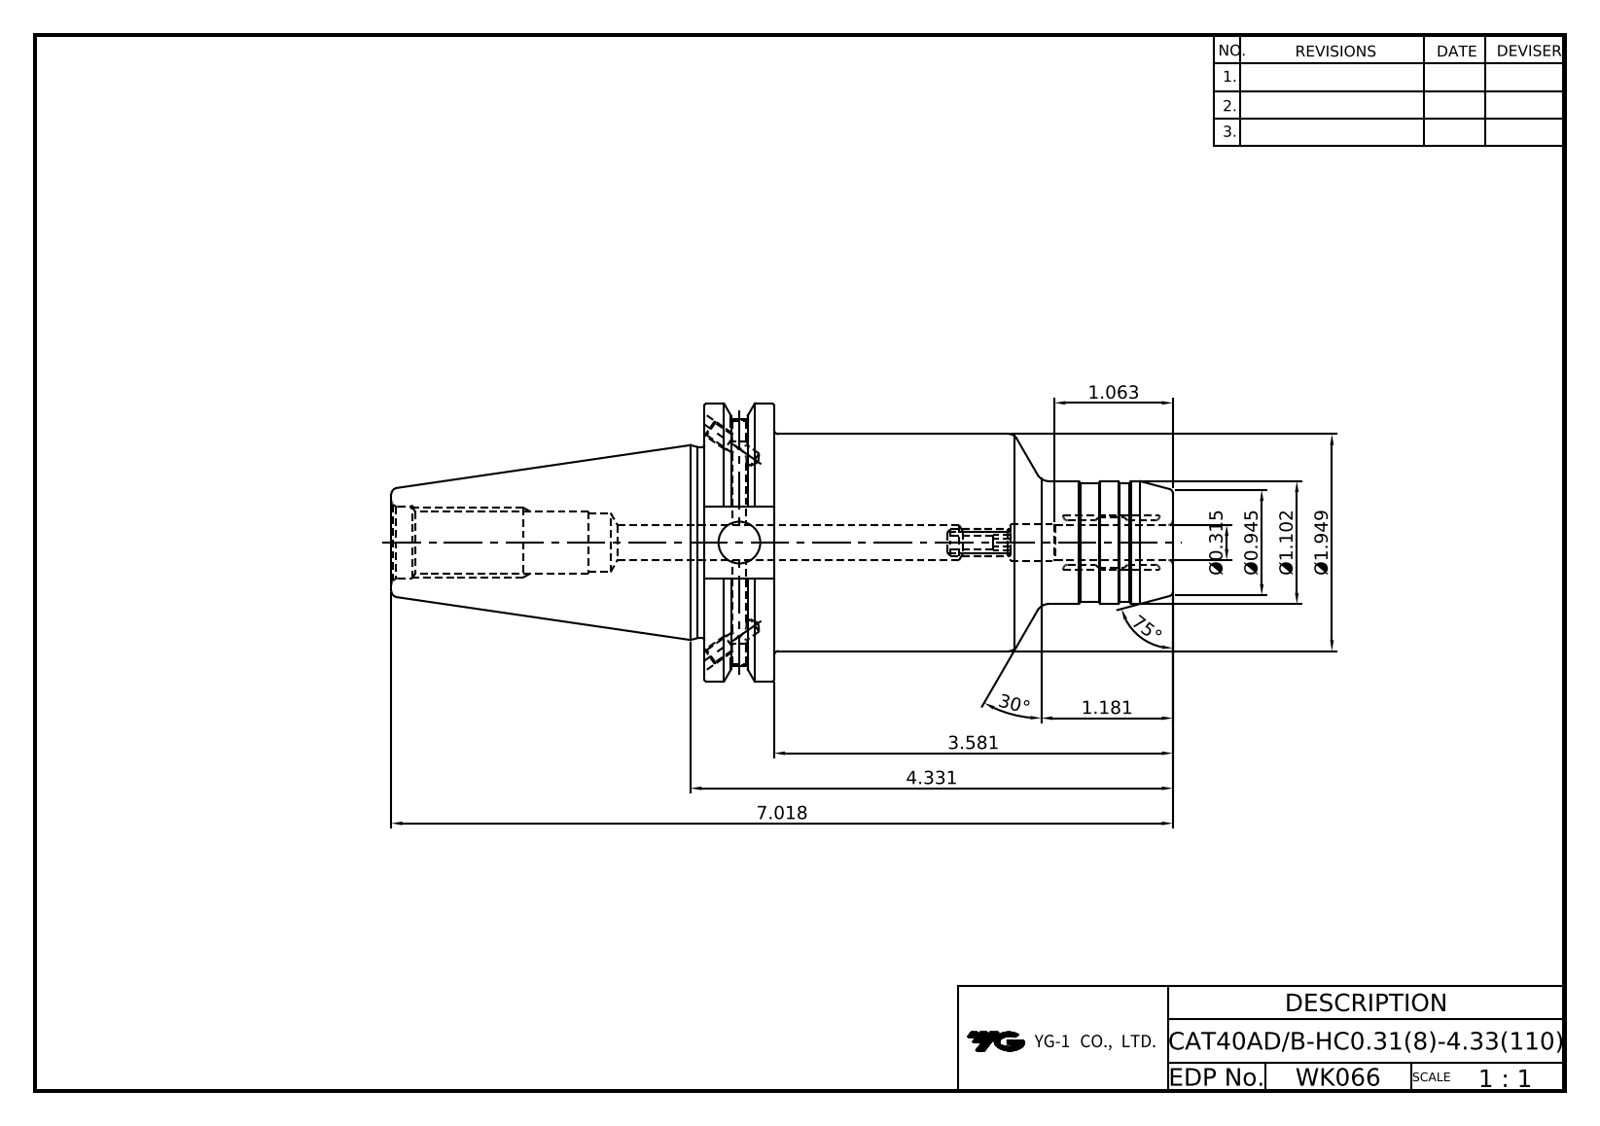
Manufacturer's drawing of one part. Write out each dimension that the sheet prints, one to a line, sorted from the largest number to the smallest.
75°
30°
7.018
4.331
3.581
Ø1.949
1.181
Ø1.102
1.063
Ø0.945
Ø0.315
